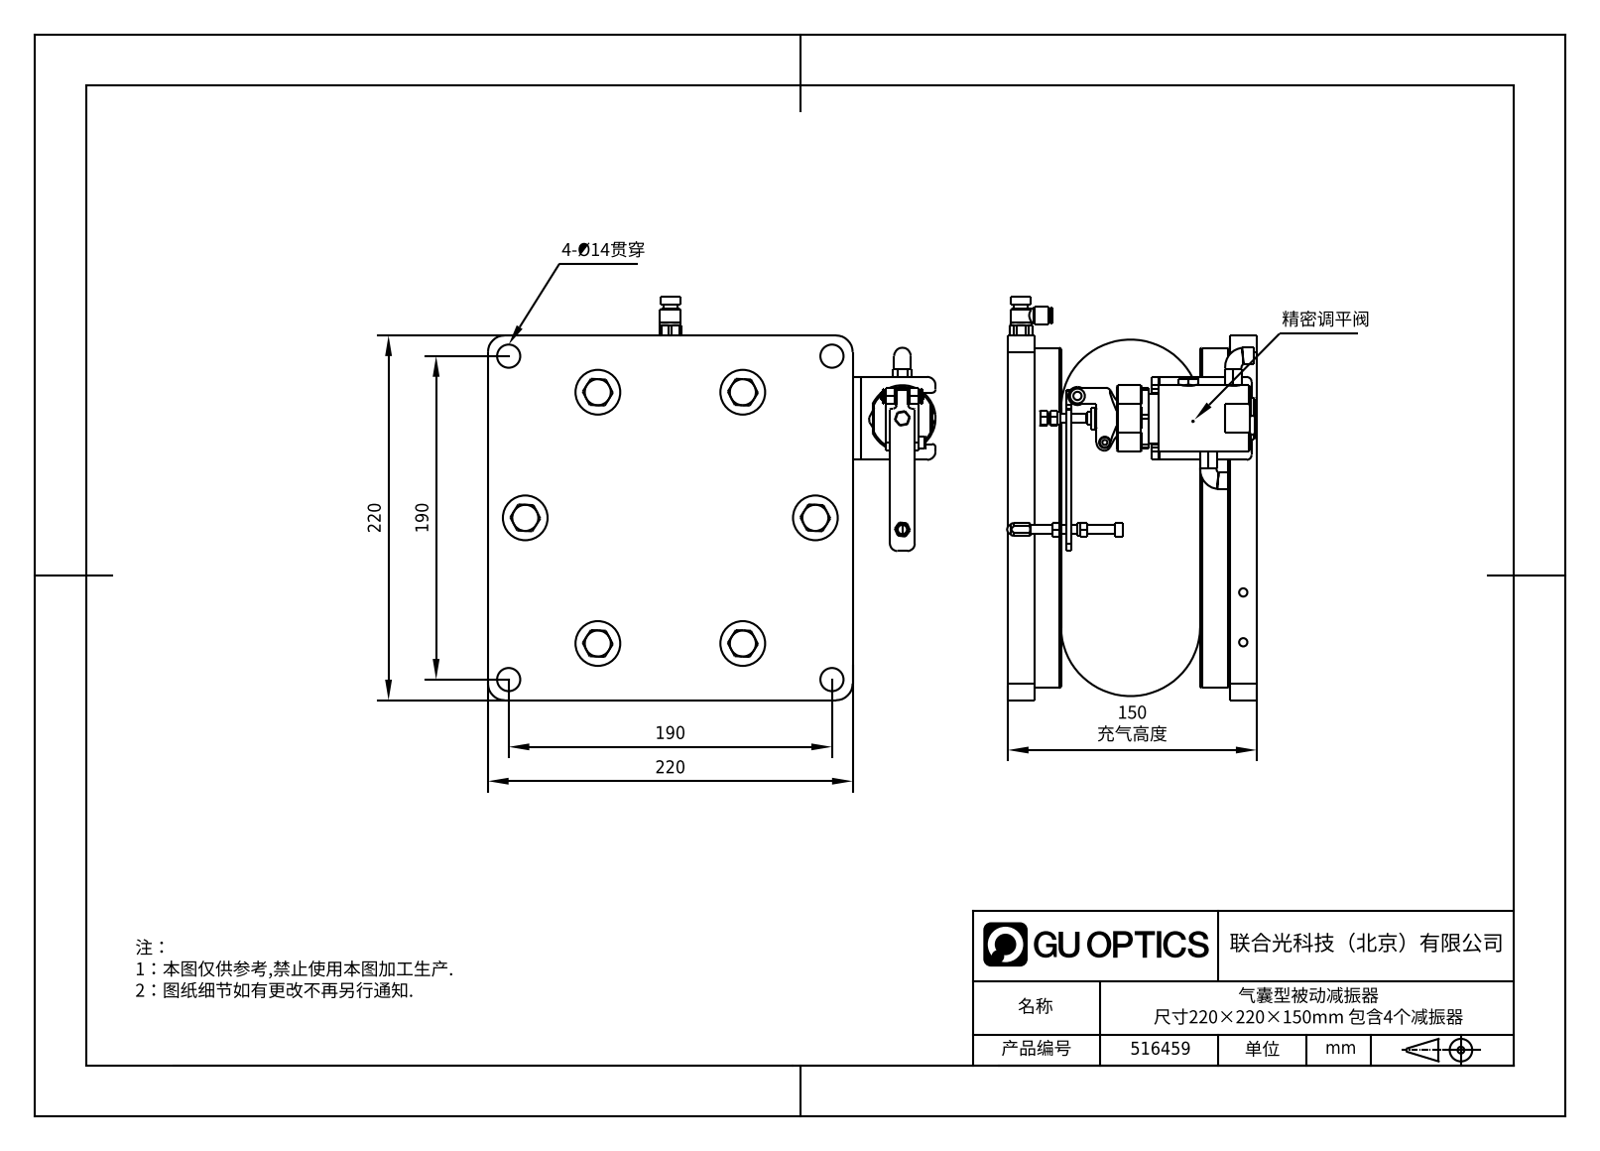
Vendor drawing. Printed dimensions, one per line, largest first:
220
220
190
190
150 充气高度
